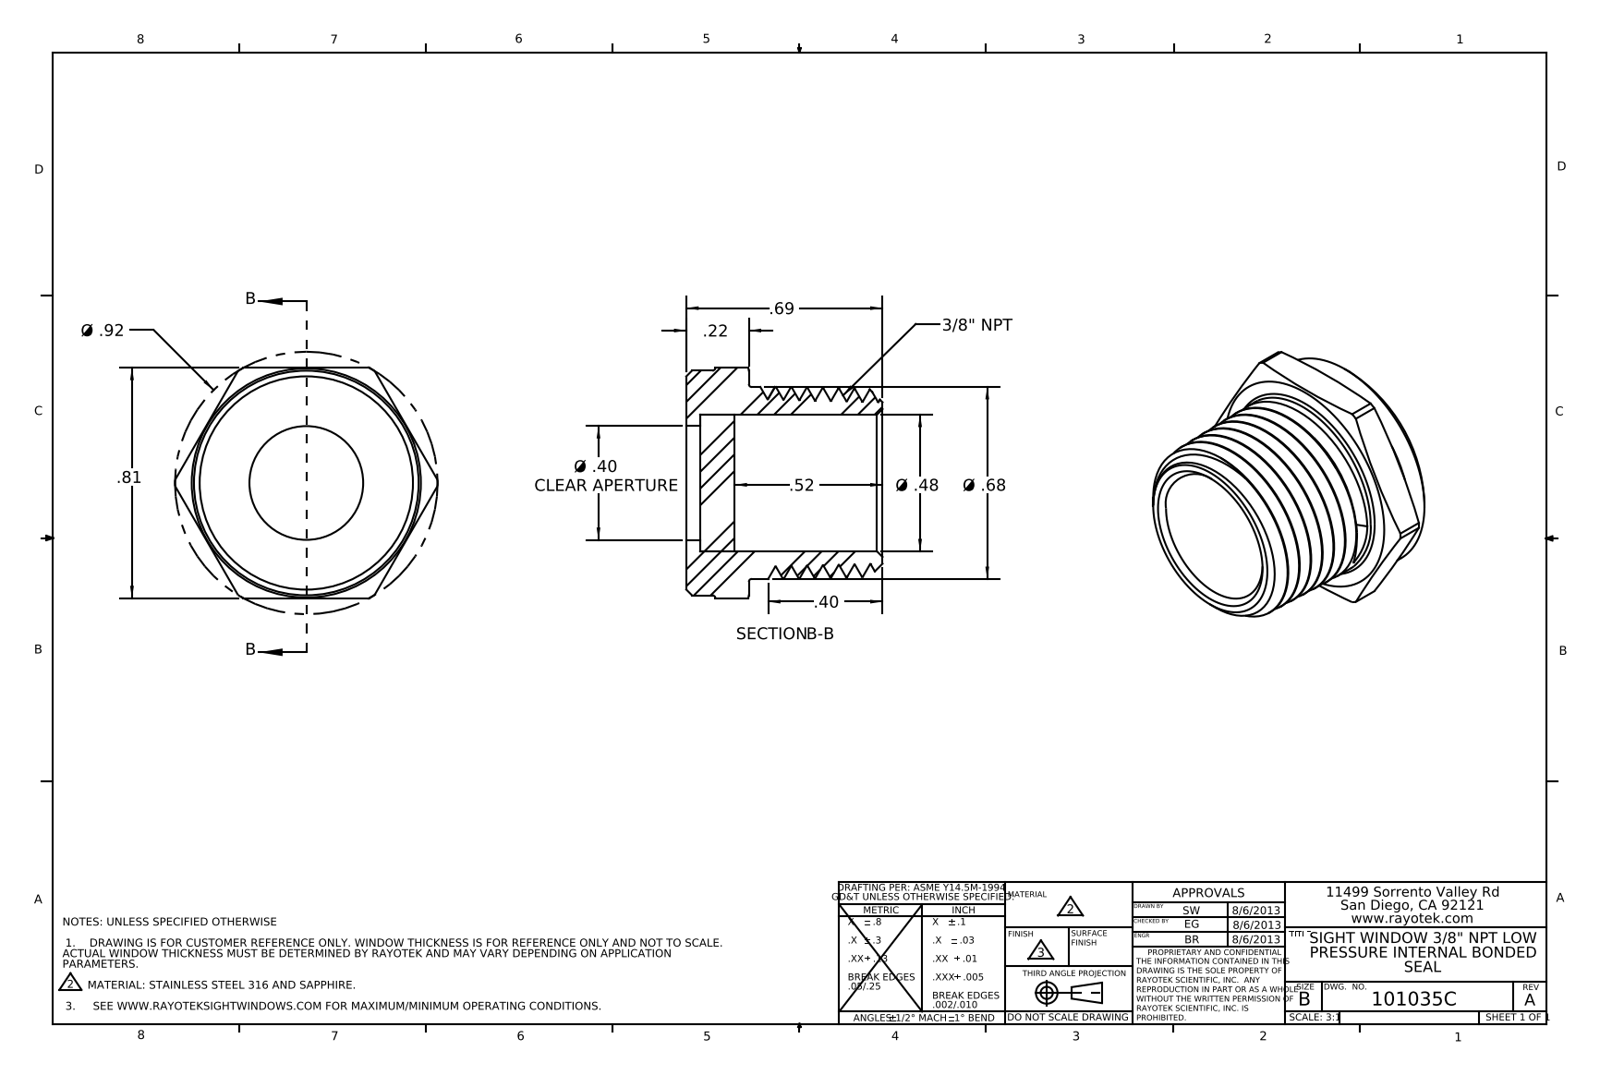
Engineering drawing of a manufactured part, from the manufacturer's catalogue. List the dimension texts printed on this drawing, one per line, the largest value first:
Ø .92
.81
.69
Ø .68
.52
Ø .48
Ø .40 CLEAR APERTURE
.40
.22
